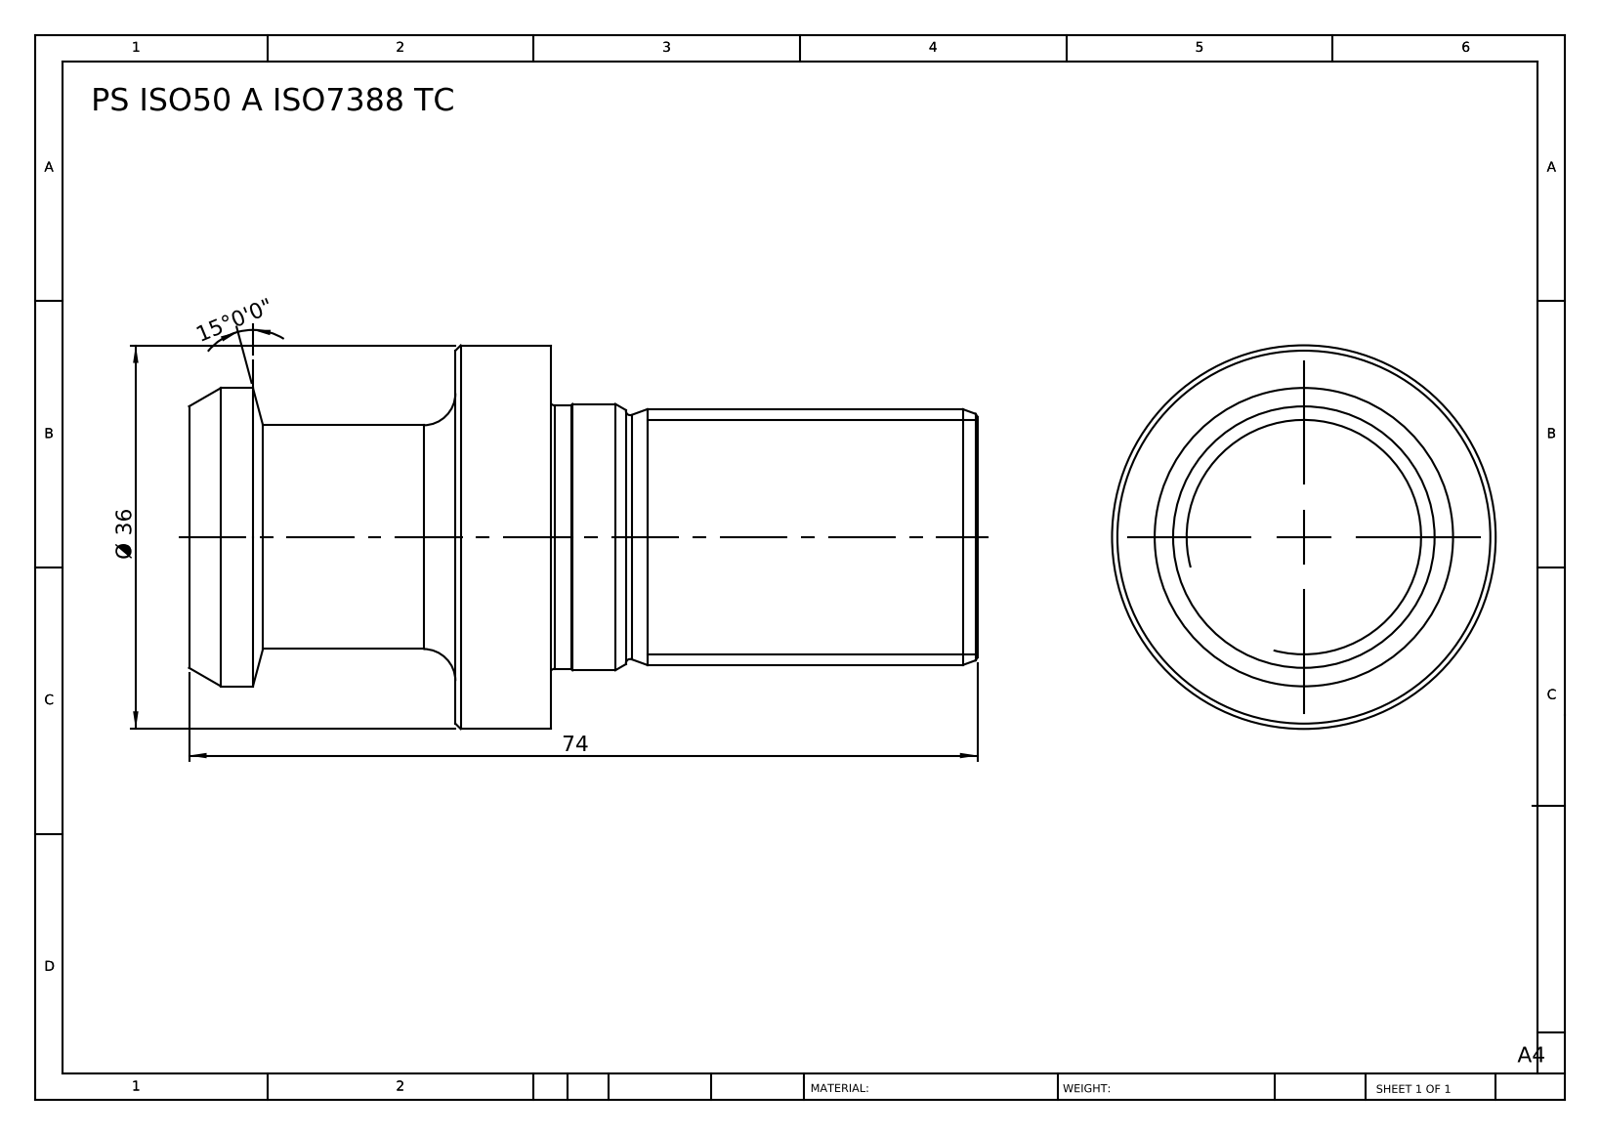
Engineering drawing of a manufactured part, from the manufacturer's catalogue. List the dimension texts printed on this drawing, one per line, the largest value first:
74
Ø 36
15°0'0"
